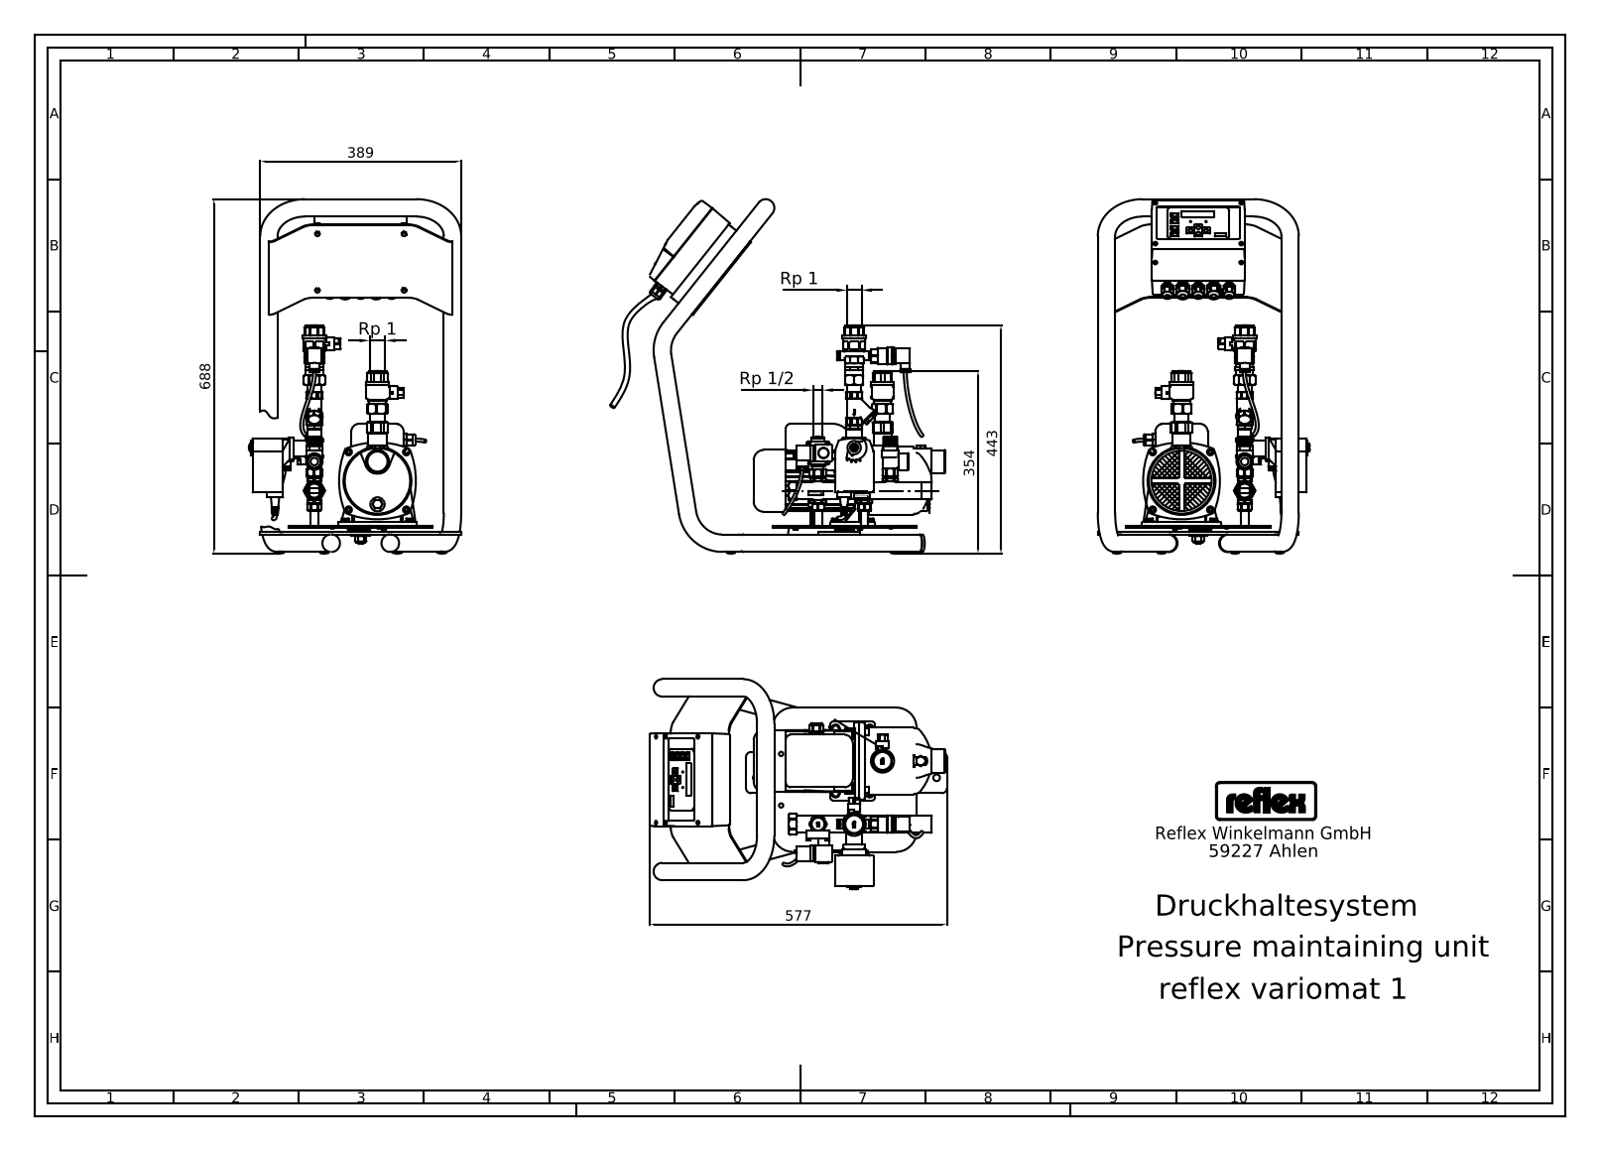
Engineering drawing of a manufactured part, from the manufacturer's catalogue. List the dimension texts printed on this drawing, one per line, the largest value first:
688
577
443
389
354
Rp 1
Rp 1
Rp 1/2
